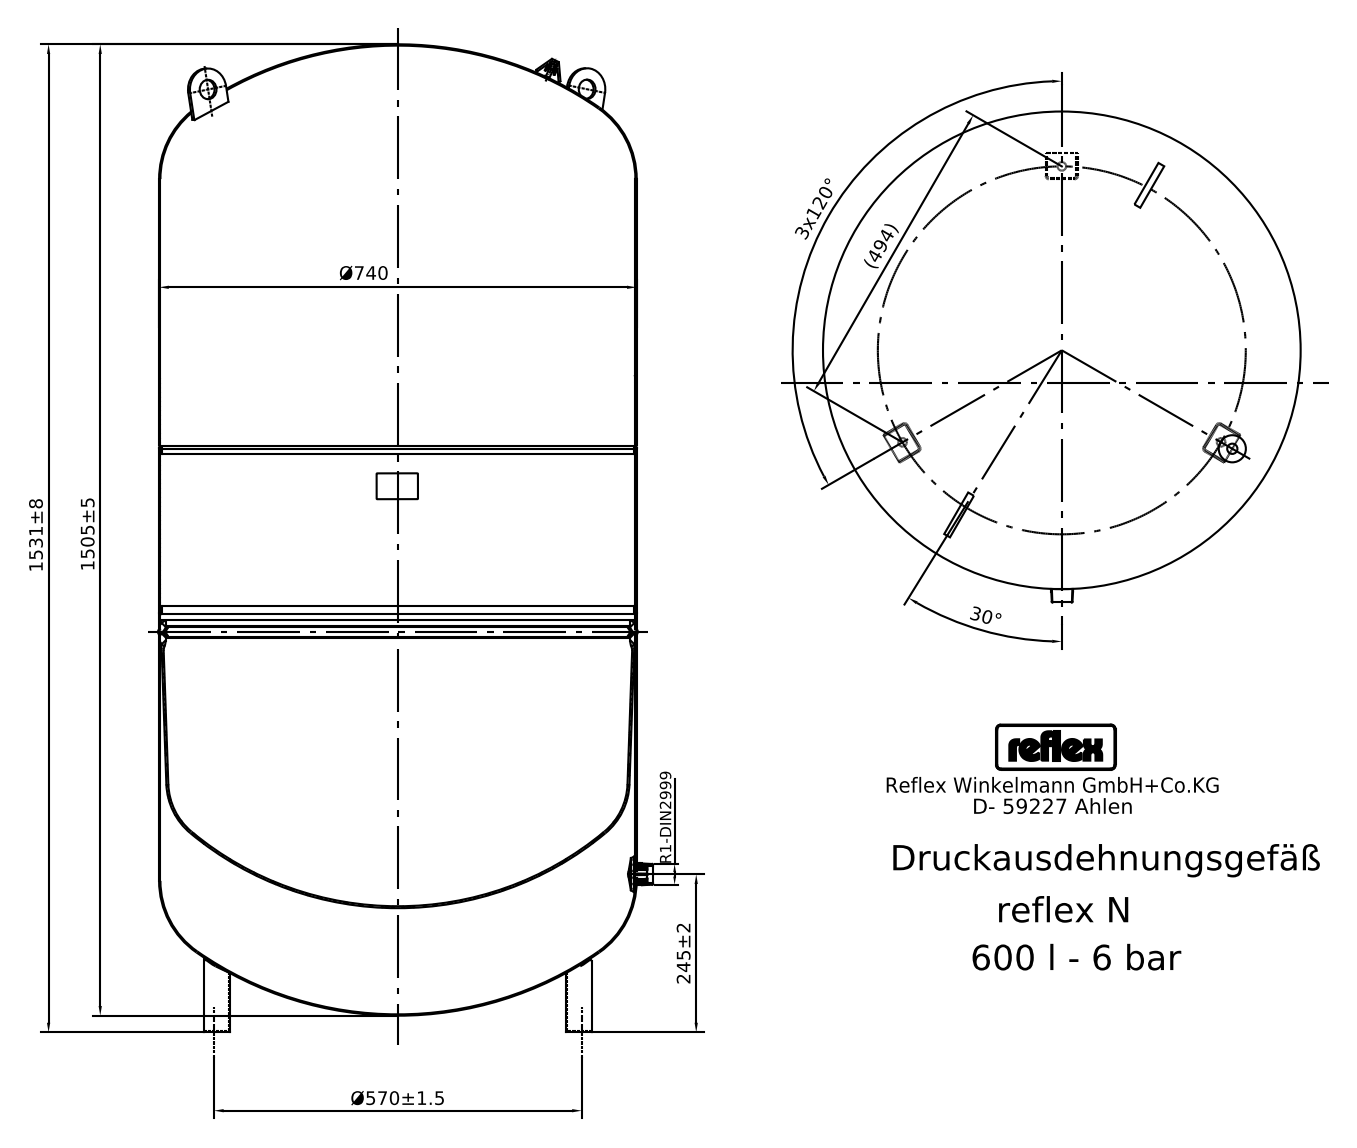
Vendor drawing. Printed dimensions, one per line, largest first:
1531±8
1505±5
Ø740
Ø570±1.5
(494)
245±2
3x120°
30°
R1-DIN2999
